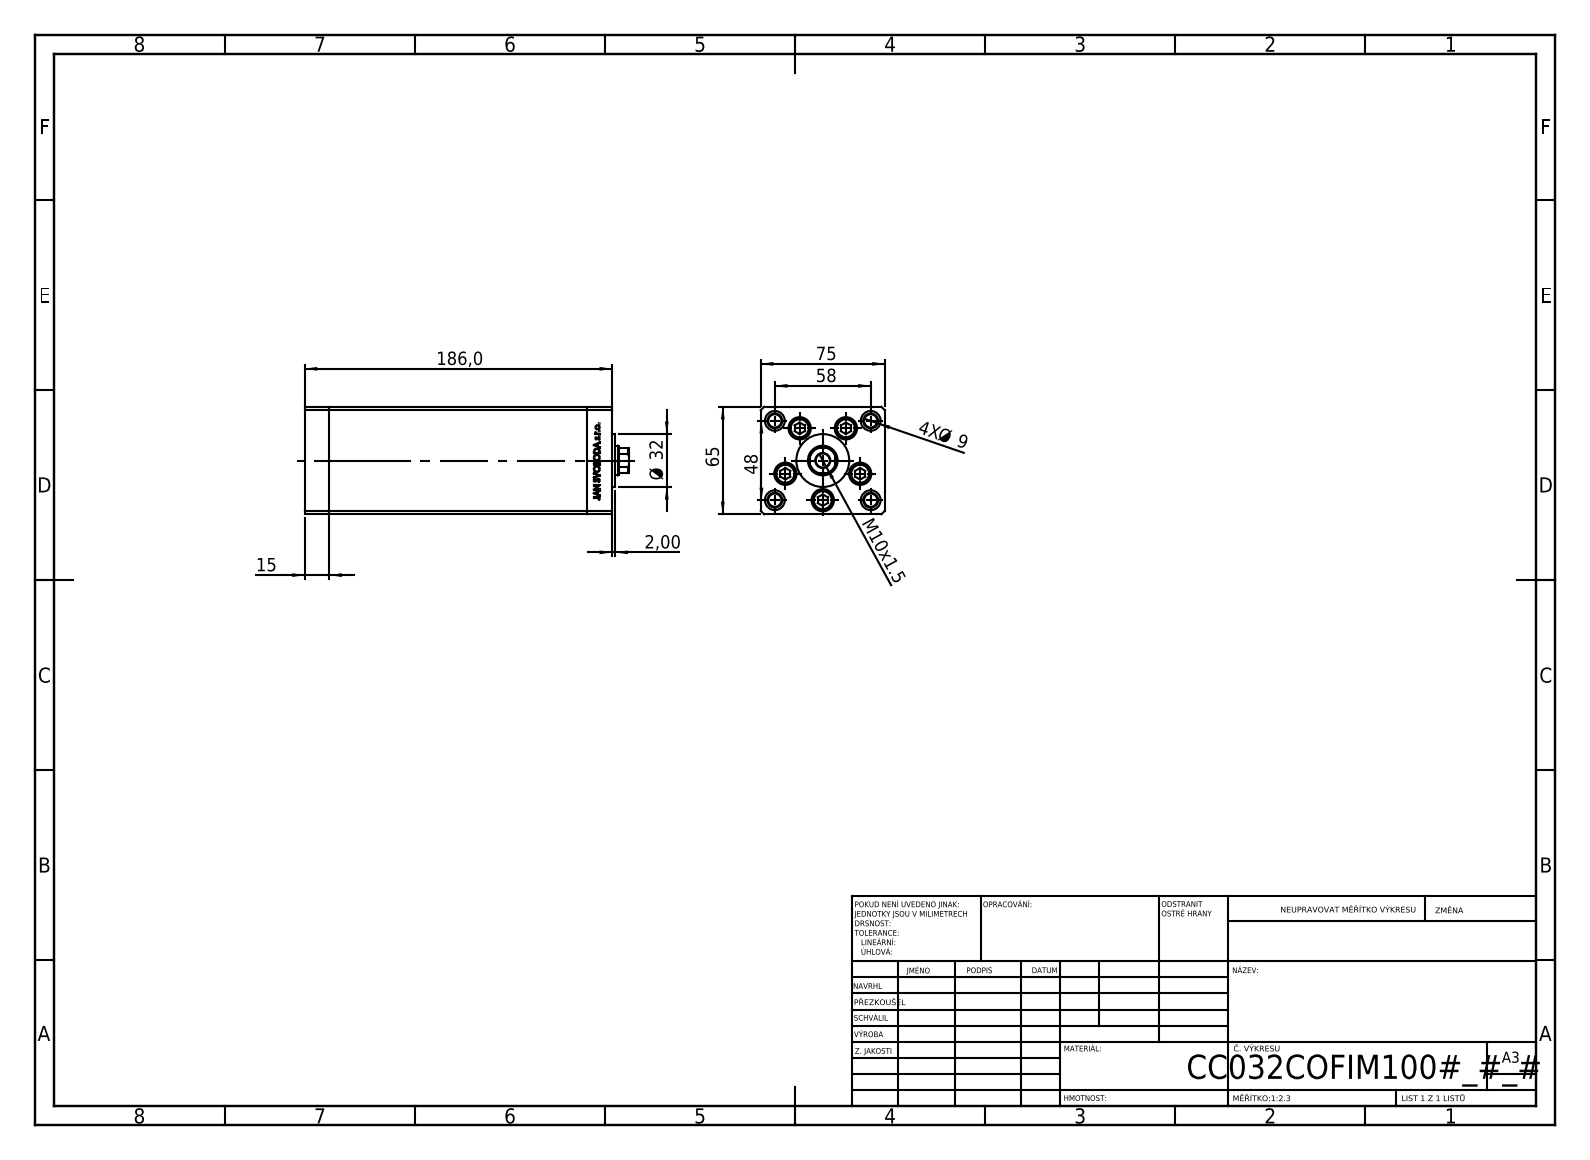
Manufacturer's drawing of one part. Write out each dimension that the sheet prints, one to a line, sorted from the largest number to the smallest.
186,0
75
65
58
48
Ø 32
15
M10x1.5
4X Ø 9
2,00
